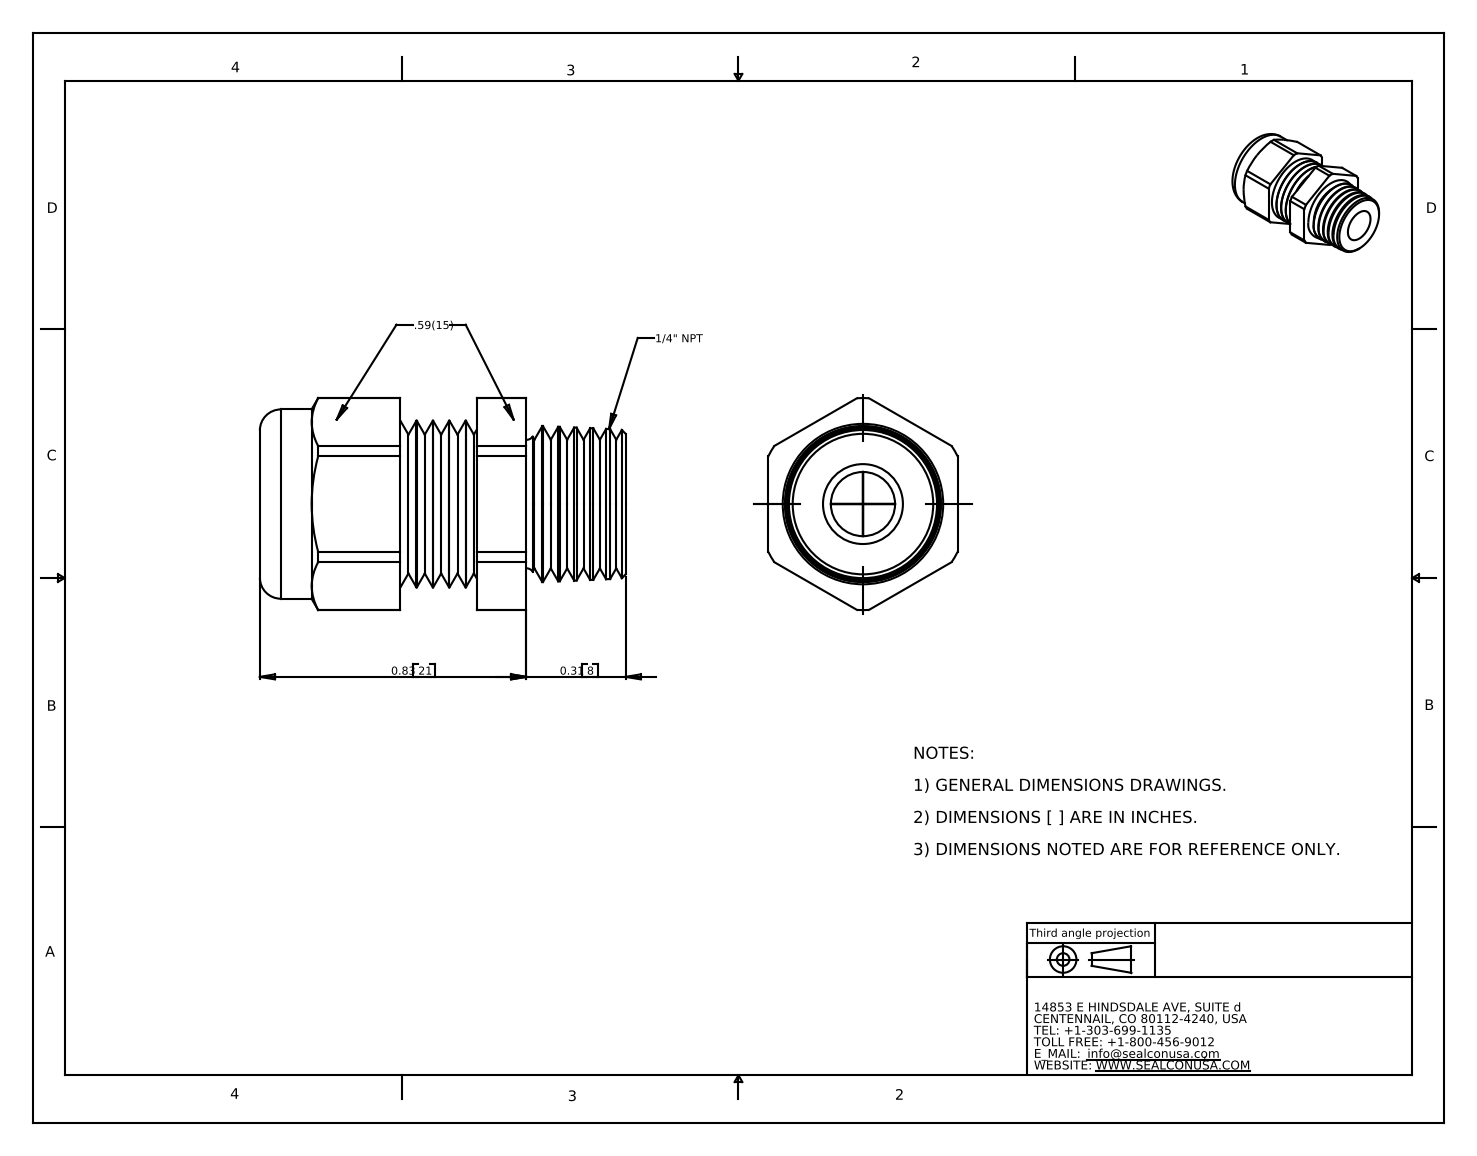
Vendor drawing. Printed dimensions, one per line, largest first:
0.83 21
0.31 8
